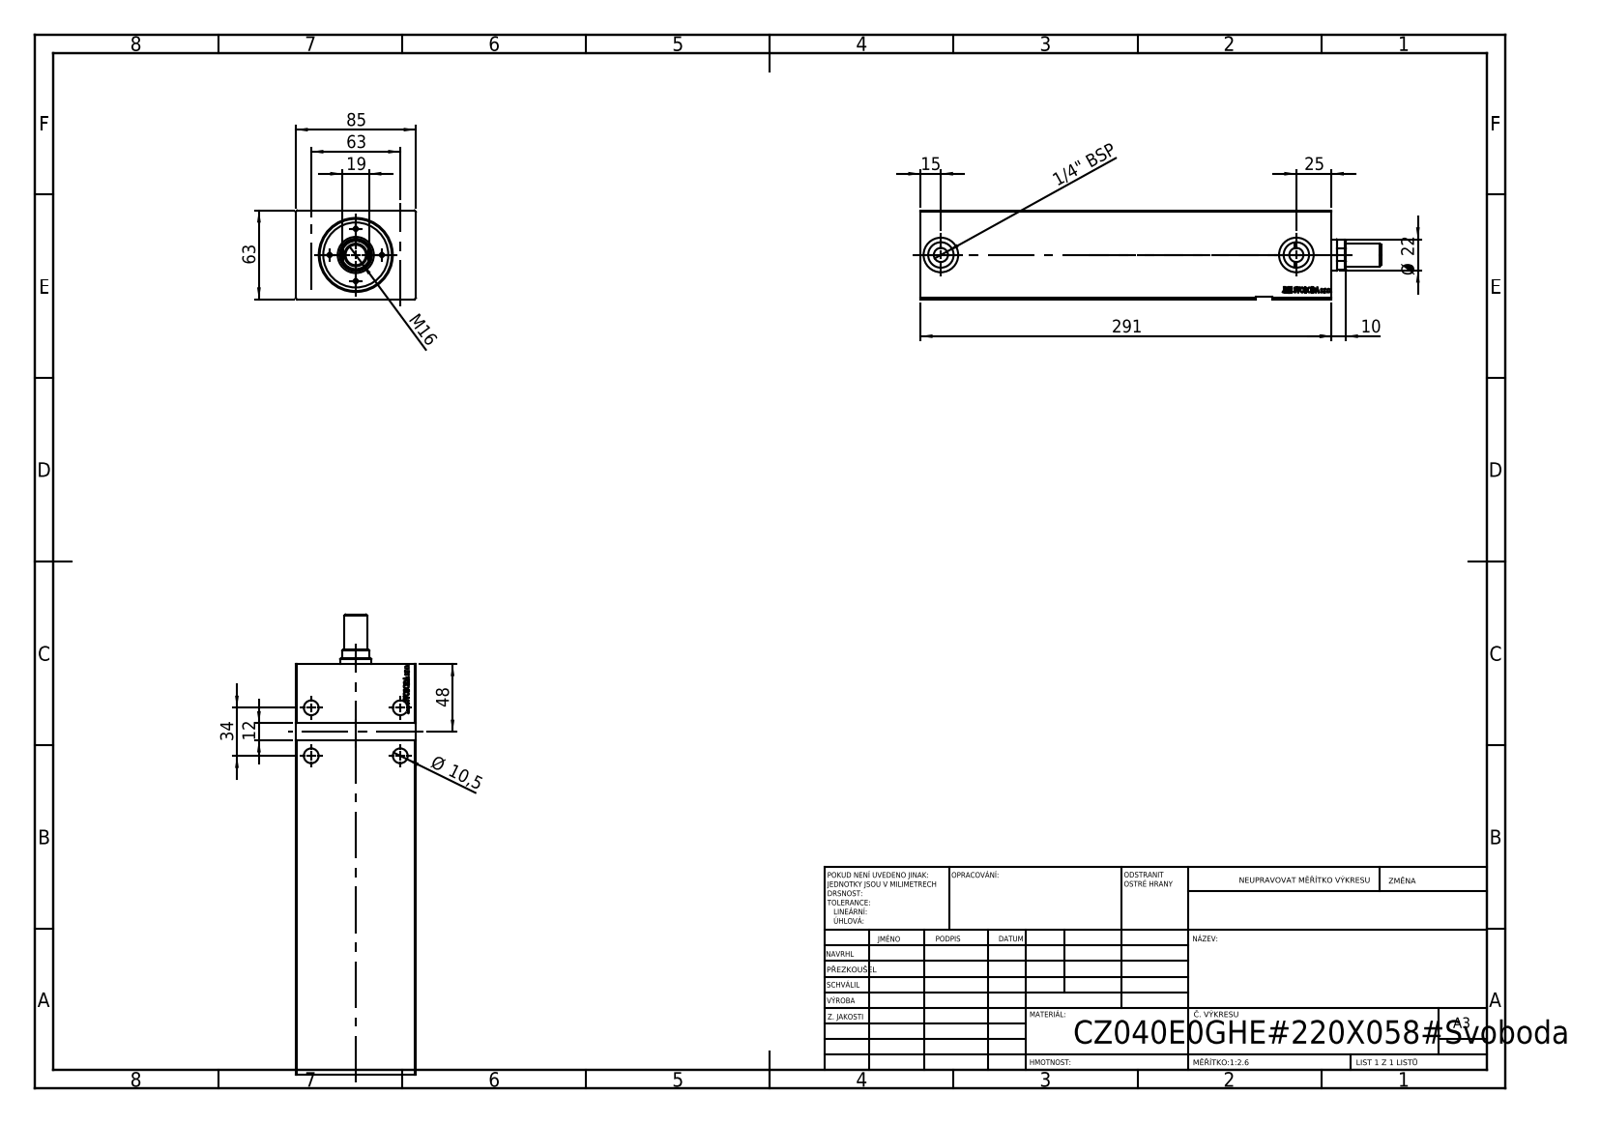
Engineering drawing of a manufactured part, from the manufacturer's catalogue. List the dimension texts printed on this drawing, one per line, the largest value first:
291
85
63
63
48
34
25
Ø 22
19
M16
15
12
Ø 10,5
10
1/4" BSP
